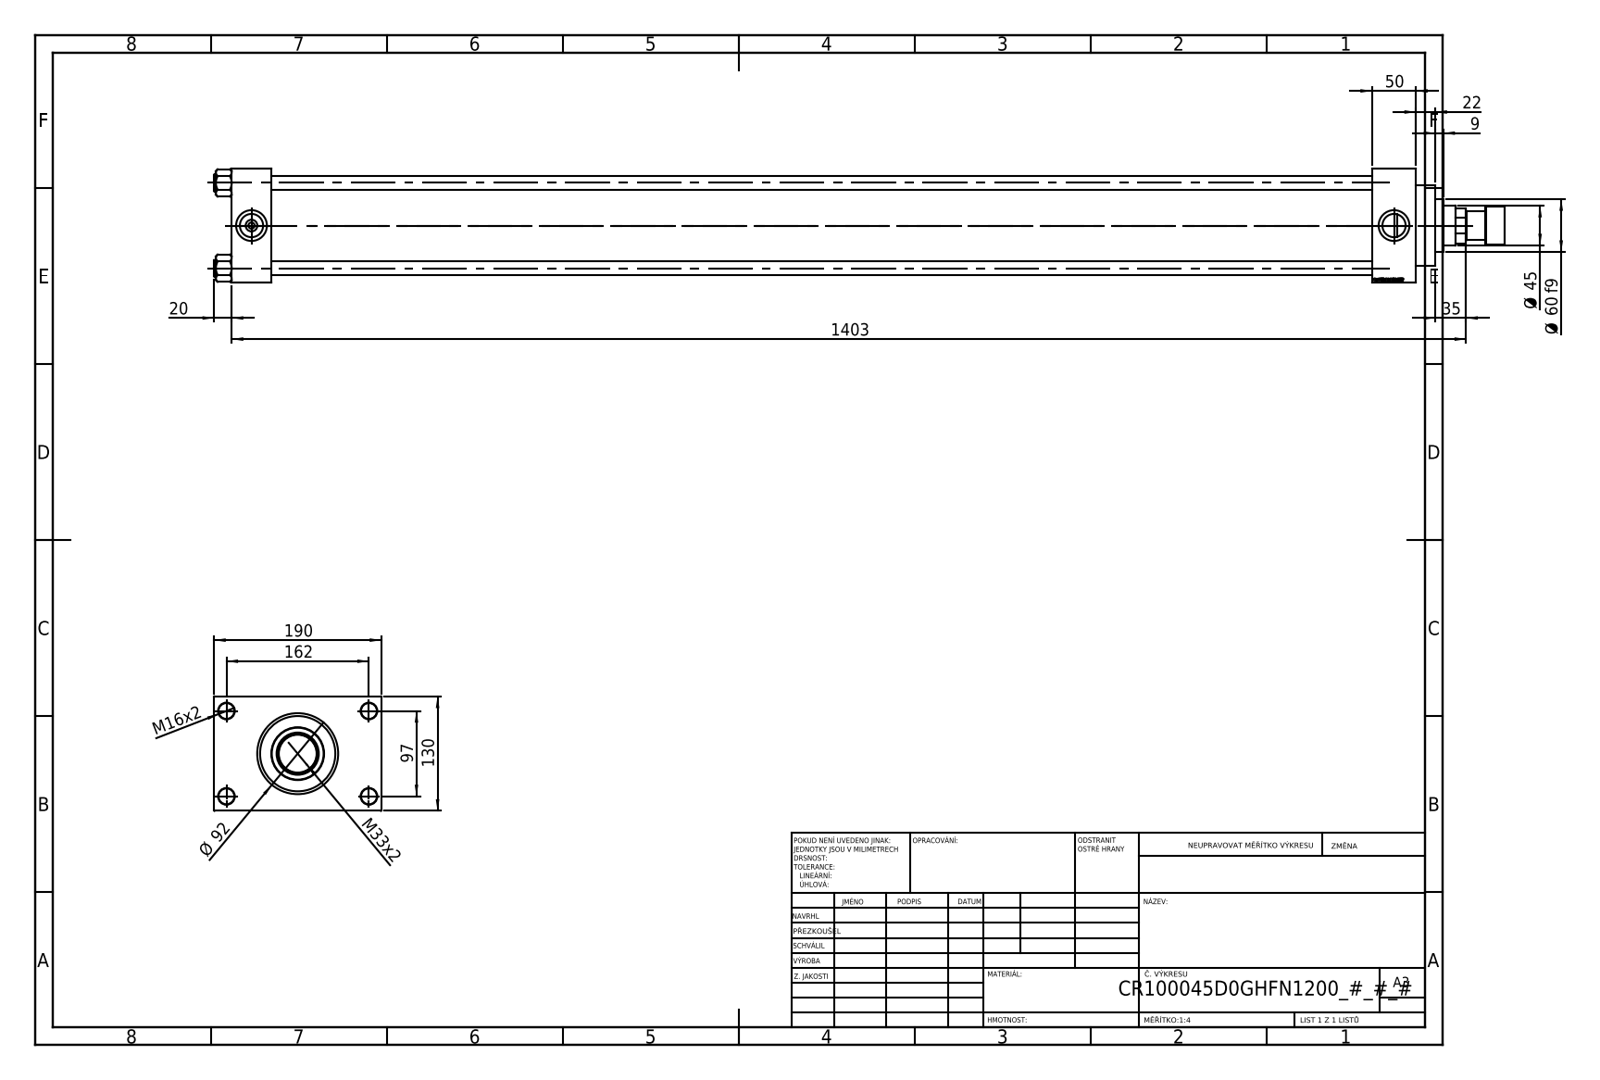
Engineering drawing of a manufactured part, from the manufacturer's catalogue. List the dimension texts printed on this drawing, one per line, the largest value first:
1403
190
162
130
97
Ø 92
Ø 60 f9
50
Ø 45
35
M33x2
22
20
M16x2
9
